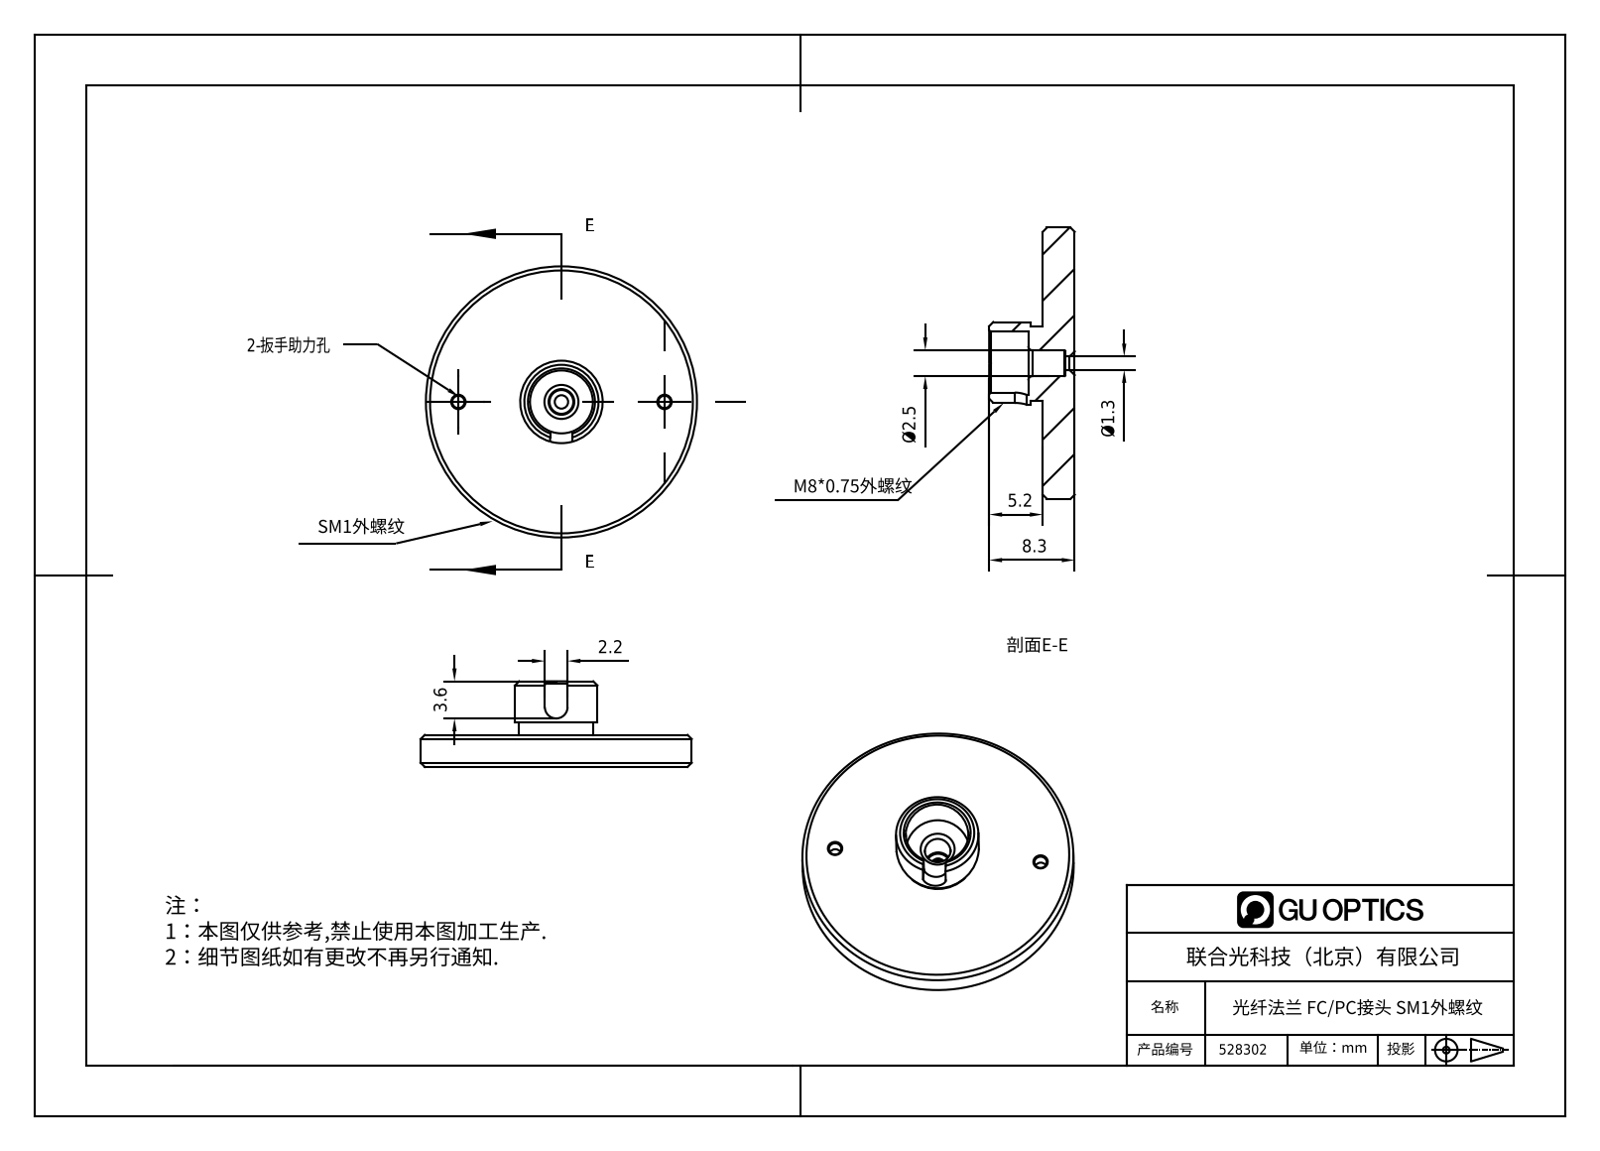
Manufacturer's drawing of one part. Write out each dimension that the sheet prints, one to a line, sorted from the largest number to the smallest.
8.3
5.2
3.6
Ø2.5
2.2
Ø1.3
